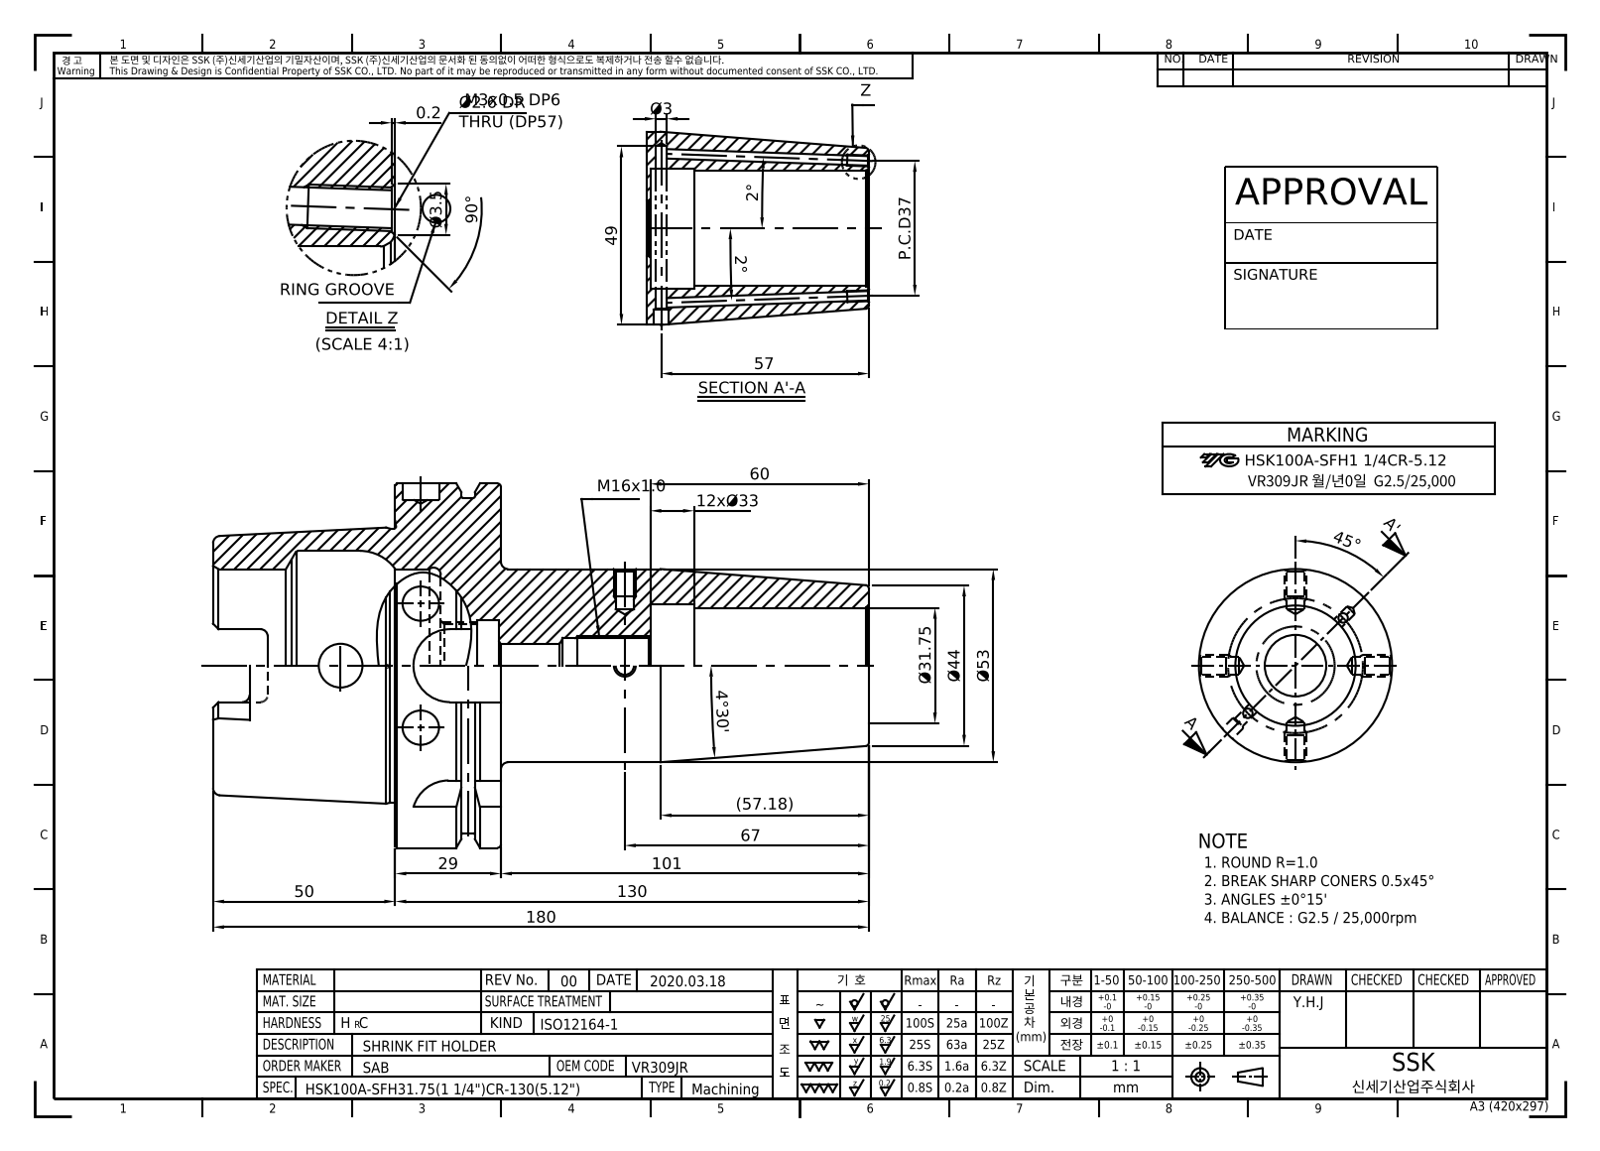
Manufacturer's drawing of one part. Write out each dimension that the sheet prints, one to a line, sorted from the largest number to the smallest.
180
130
101
90°
67
60
(57.18)
57
Ø53
50
49
45°
Ø44
P.C.D37
12xØ33
Ø31.75
29
4°30'
Ø3.5
Ø3
2°
2°
0.2
